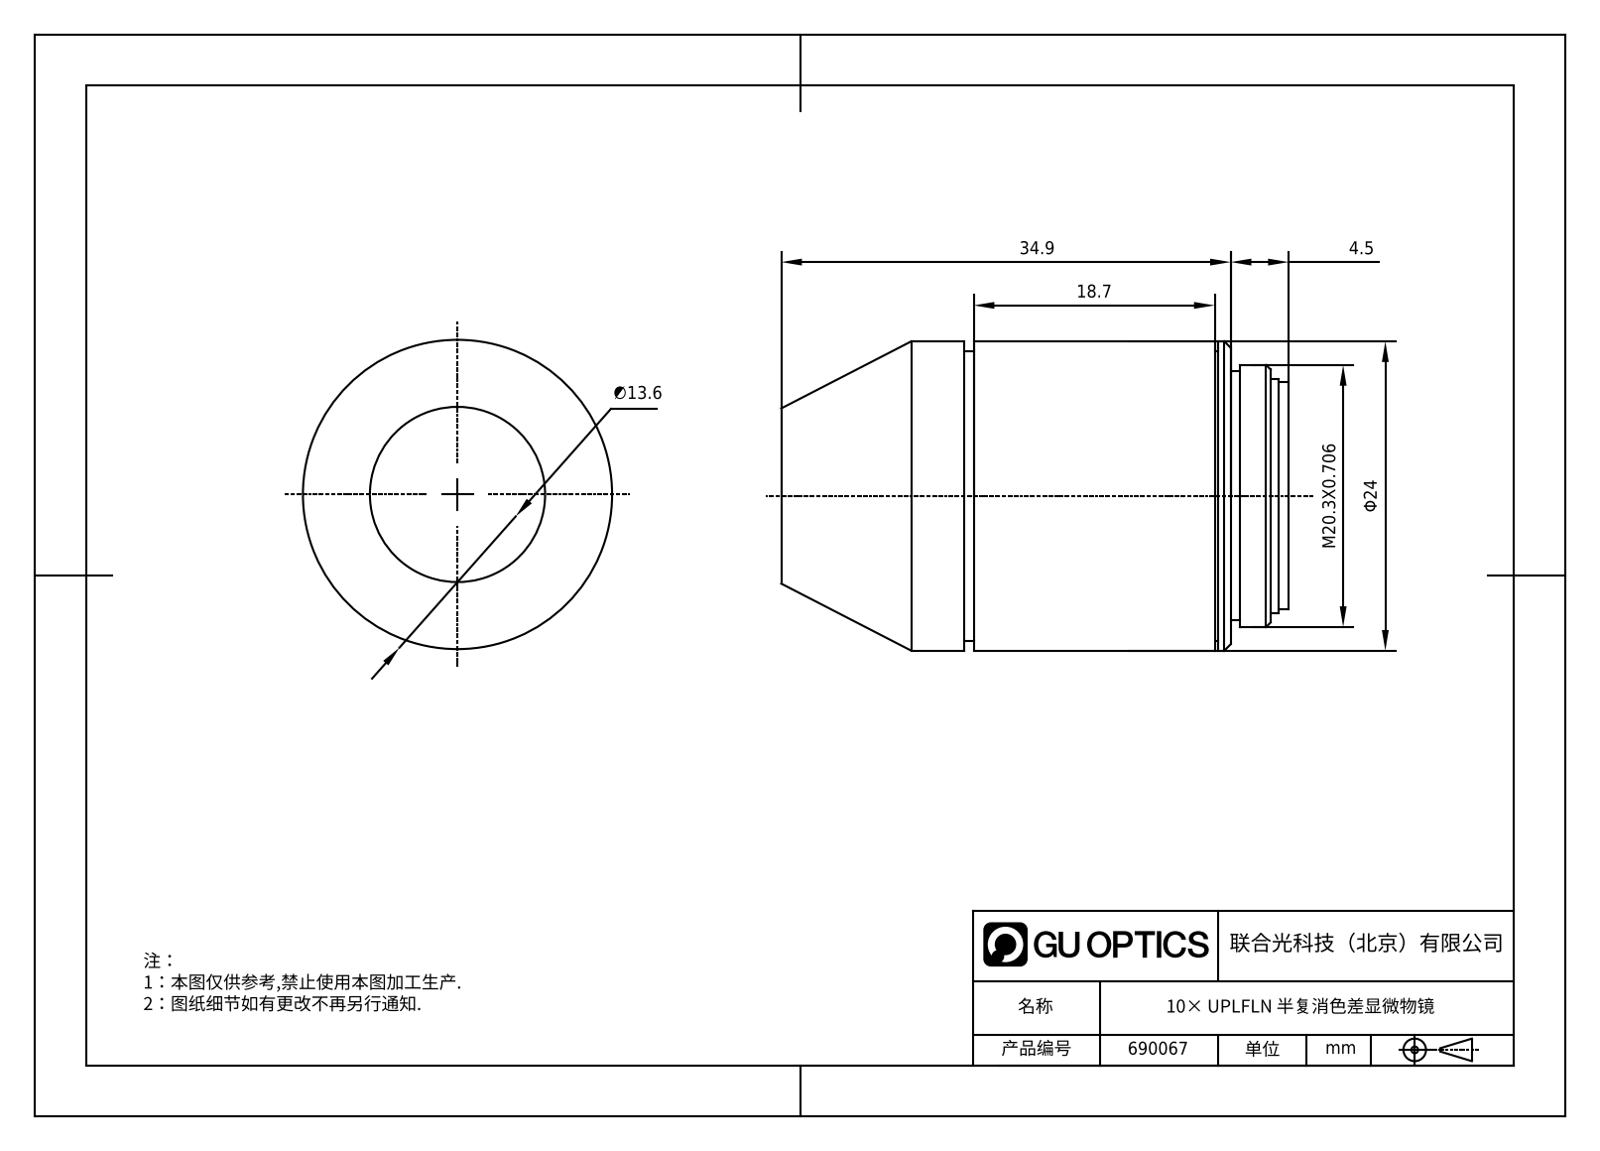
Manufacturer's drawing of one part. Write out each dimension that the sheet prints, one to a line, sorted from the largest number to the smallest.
34.9
Φ24
M20.3X0.706
18.7
∅13.6
4.5
